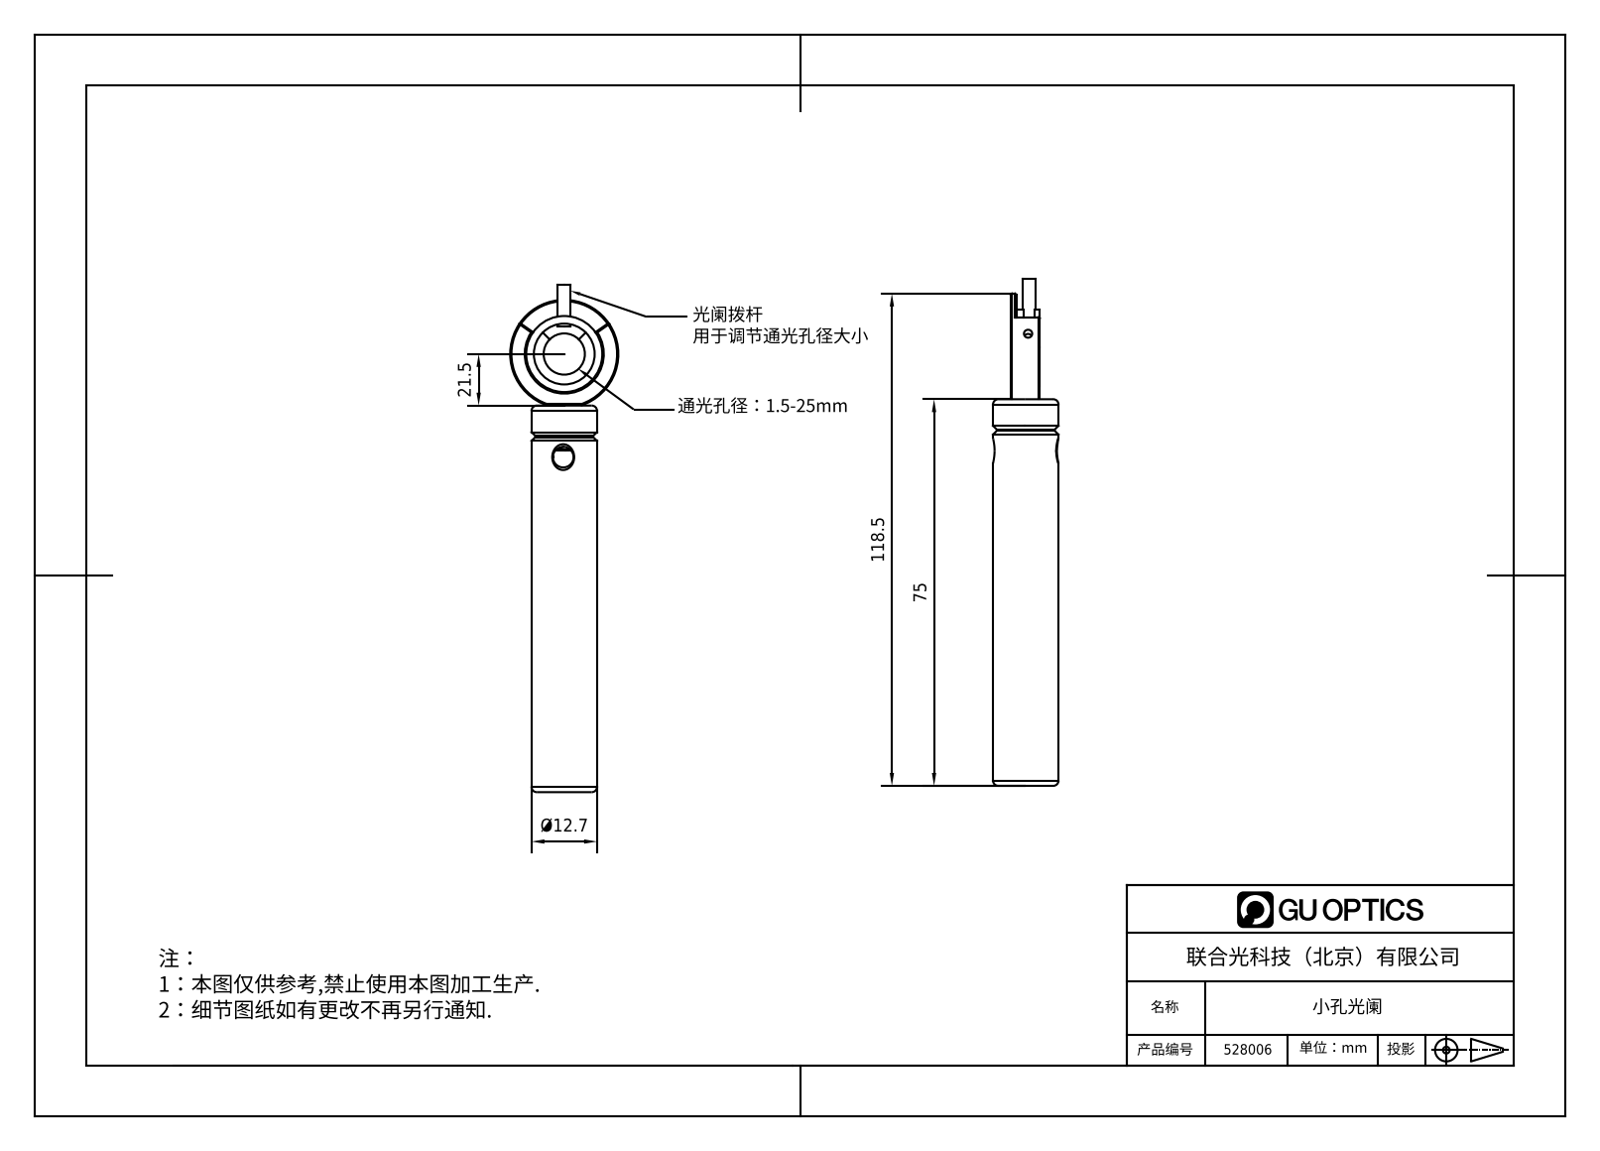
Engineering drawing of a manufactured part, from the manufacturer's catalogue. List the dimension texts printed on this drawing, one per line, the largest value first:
118.5
75
21.5
Ø12.7
